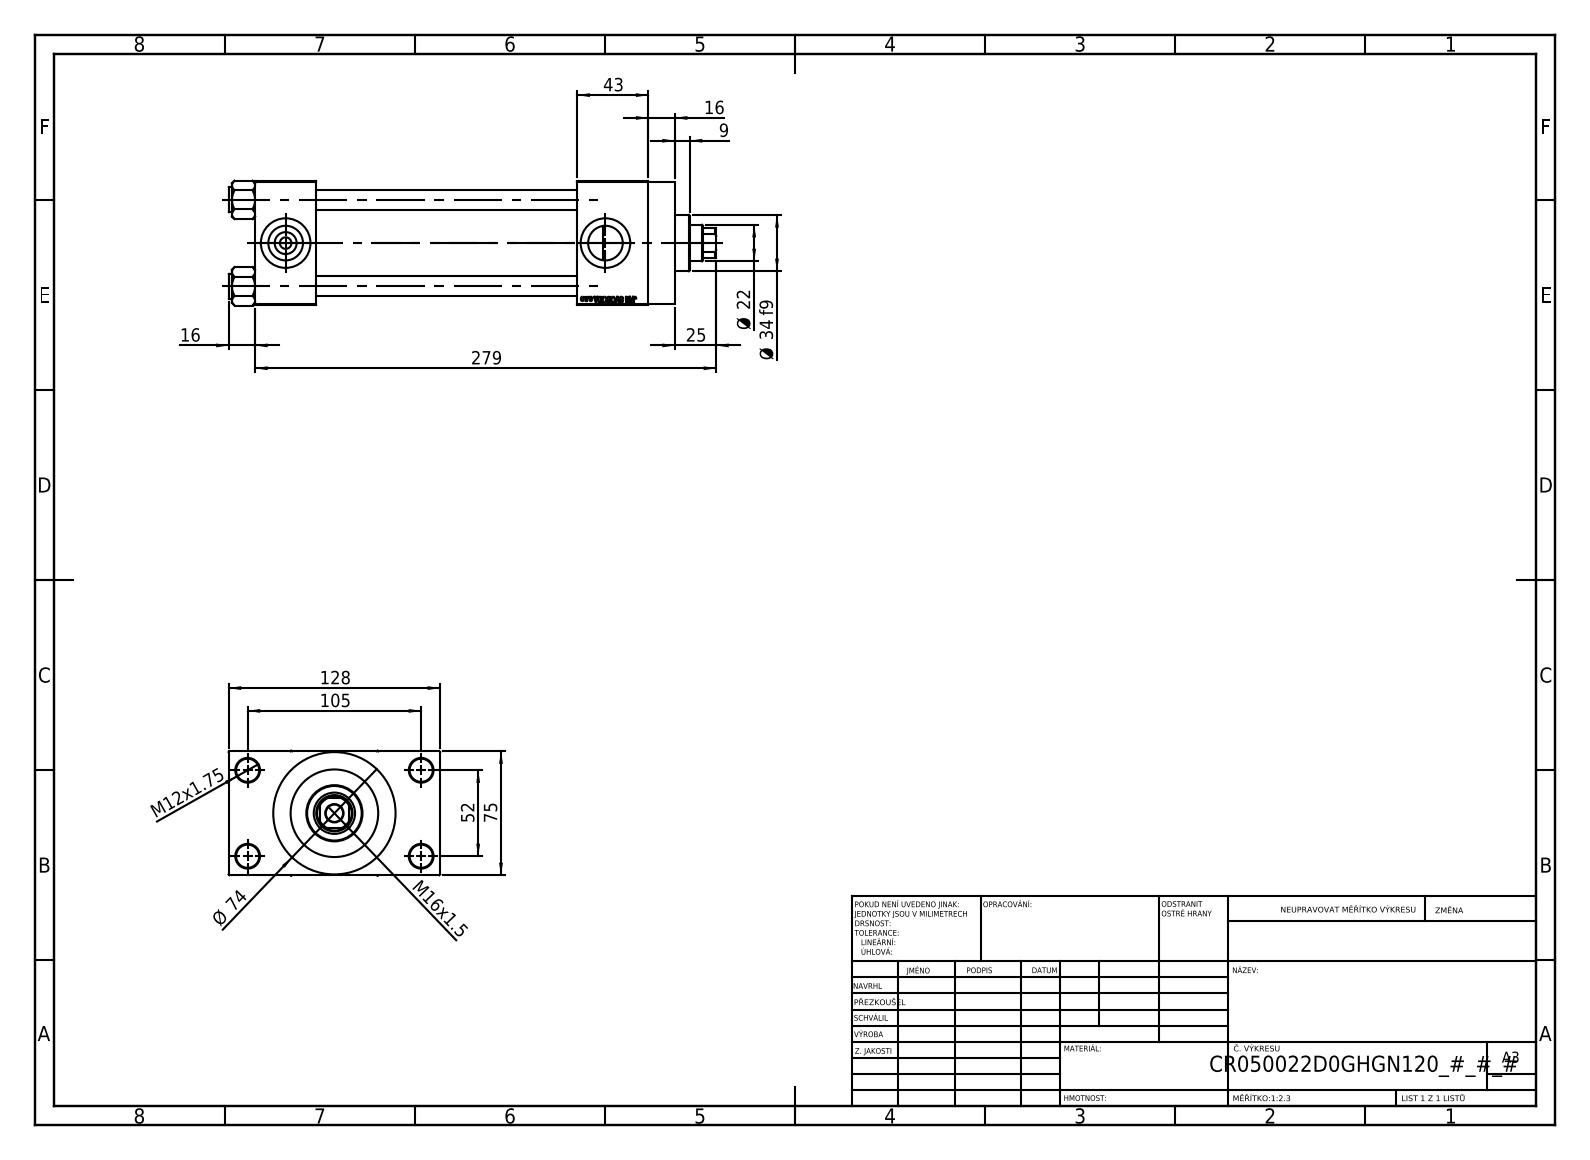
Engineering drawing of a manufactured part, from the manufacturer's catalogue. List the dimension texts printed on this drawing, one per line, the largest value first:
279
128
105
75
Ø 74
52
43
Ø 34 f9
25
Ø 22
16
16
M16x1.5
M12x1.75
9
